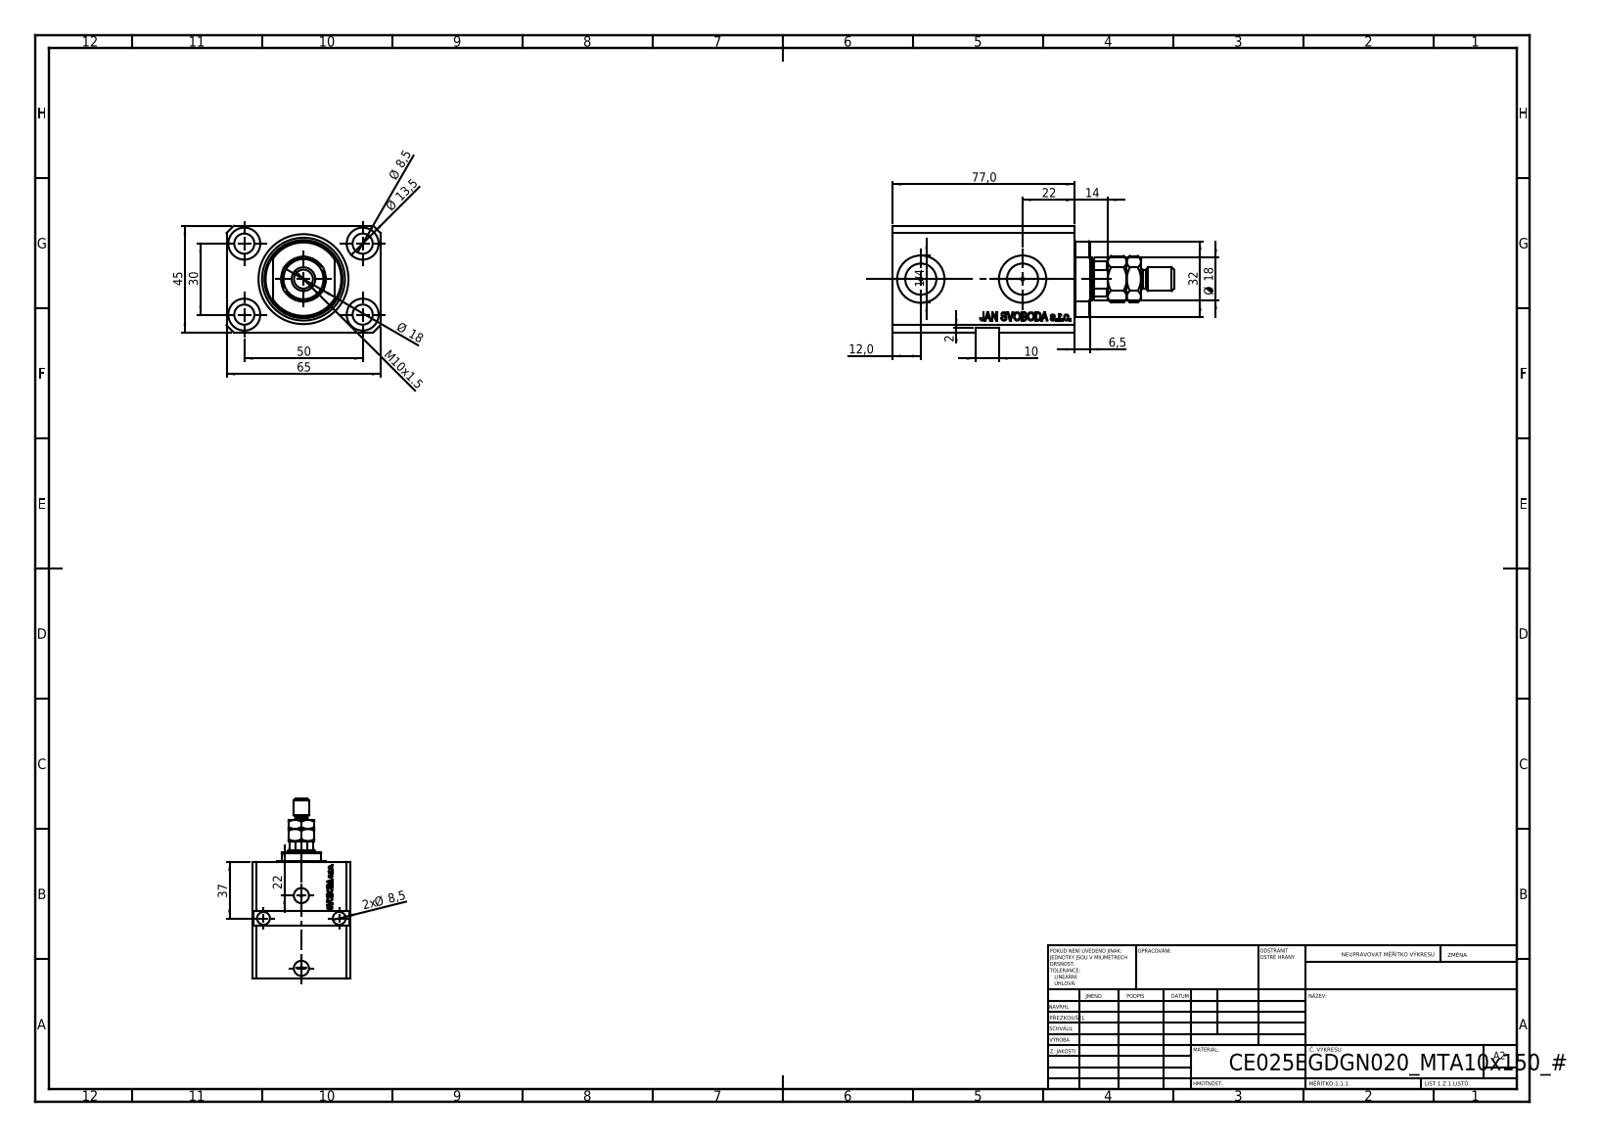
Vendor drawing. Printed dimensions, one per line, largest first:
77,0
65
50
45
37
32
30
22
22
Ø 18
Ø 18
14
Ø 13,5
12,0
M10x1.5
10
Ø 8,5
2x Ø 8,5
6,5
2
1/4
